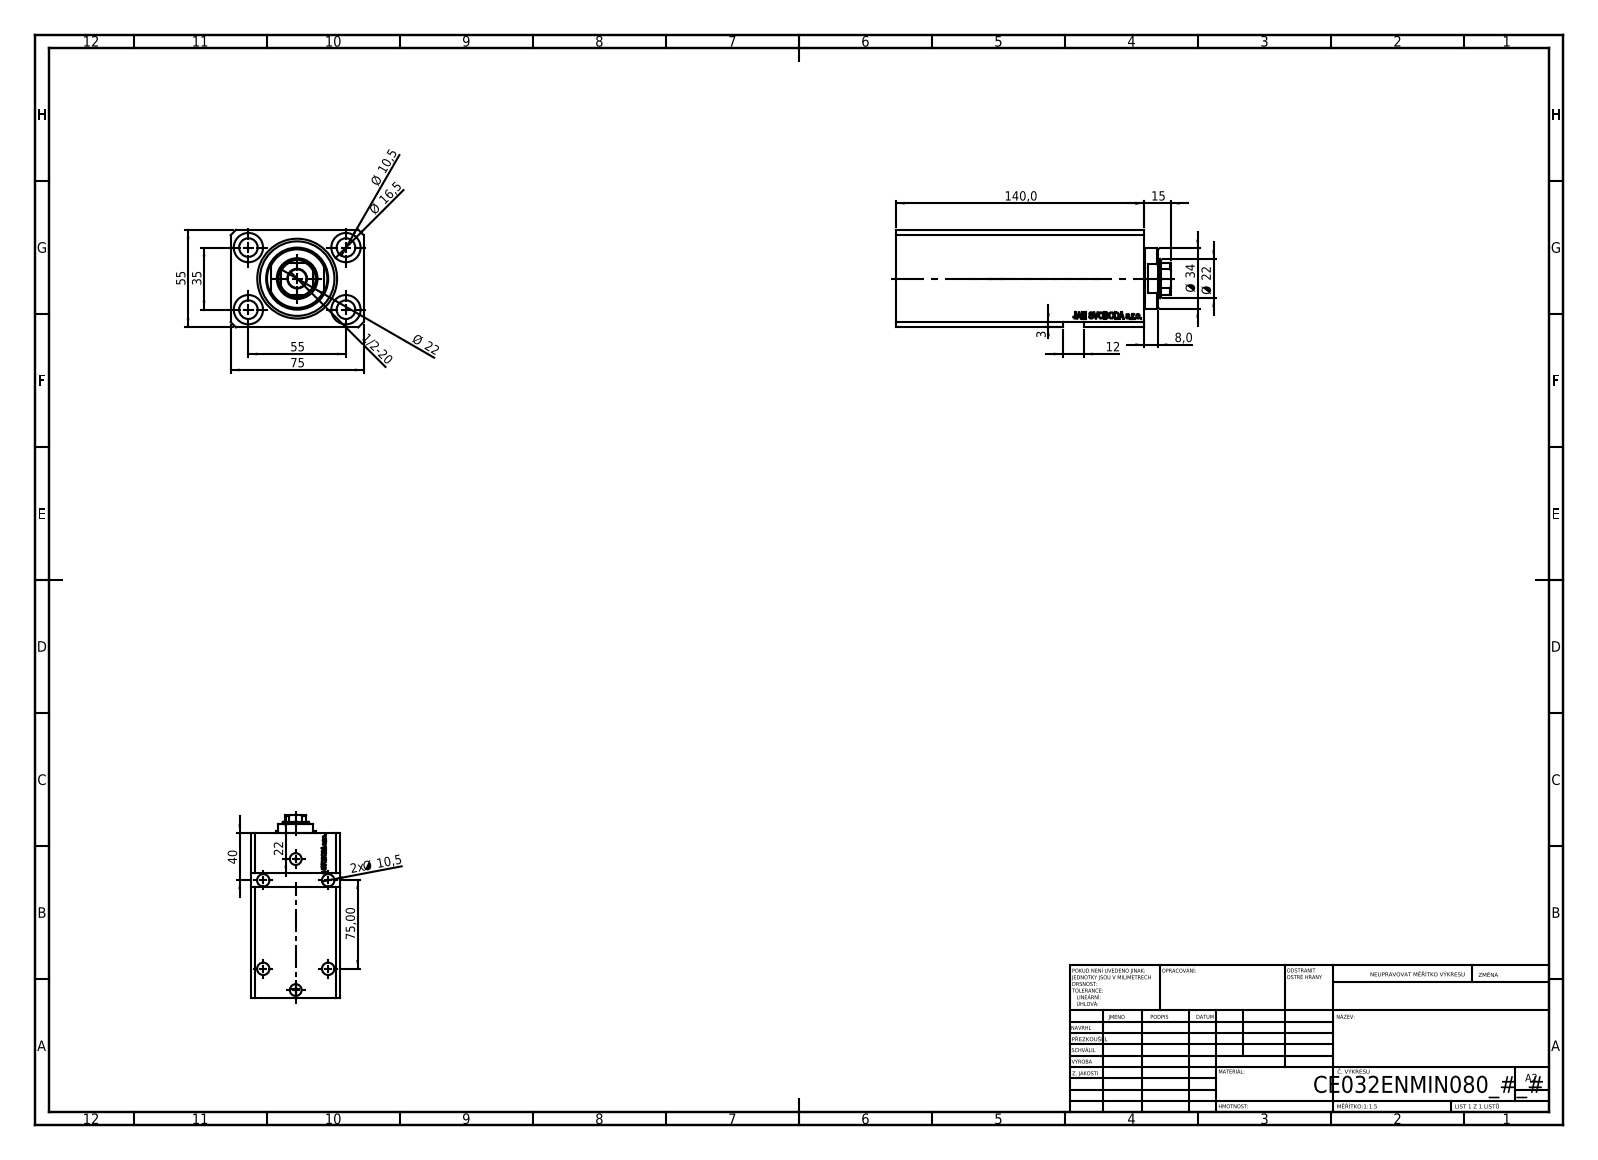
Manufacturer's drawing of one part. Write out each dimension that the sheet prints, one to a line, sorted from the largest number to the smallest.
140,0
75
75,00
55
55
40
35
Ø 34
Ø 22
Ø 22
22
Ø 16,5
15
12
Ø 10,5
2x Ø 10,5
8,0
3
1/2-20
